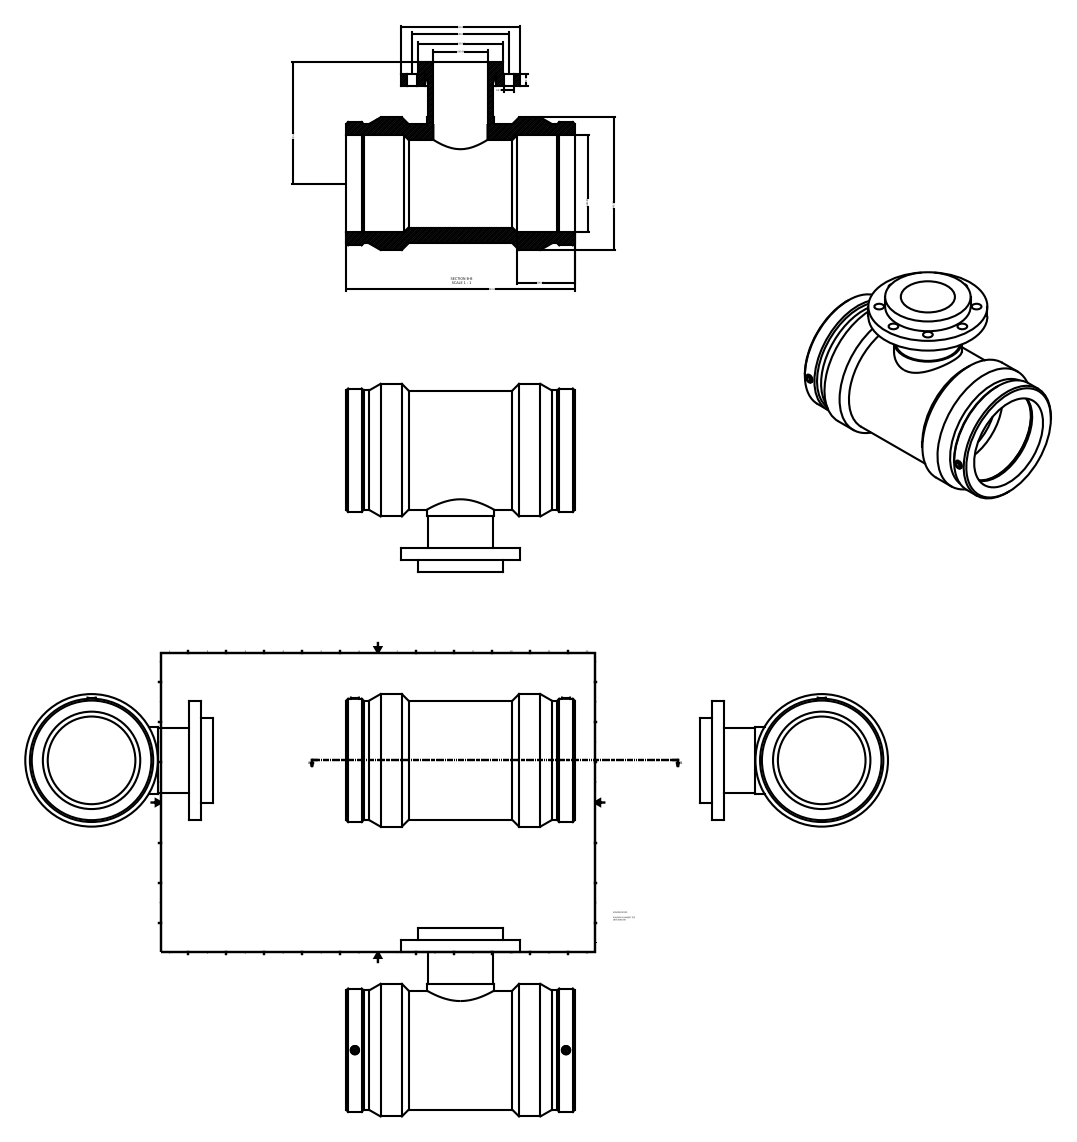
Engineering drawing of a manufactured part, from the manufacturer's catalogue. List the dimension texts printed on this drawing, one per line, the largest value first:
422.00
245.00
225.00
220.00
n180.00
180.00
158.00
106.00
n100.00
22.00
18.00
